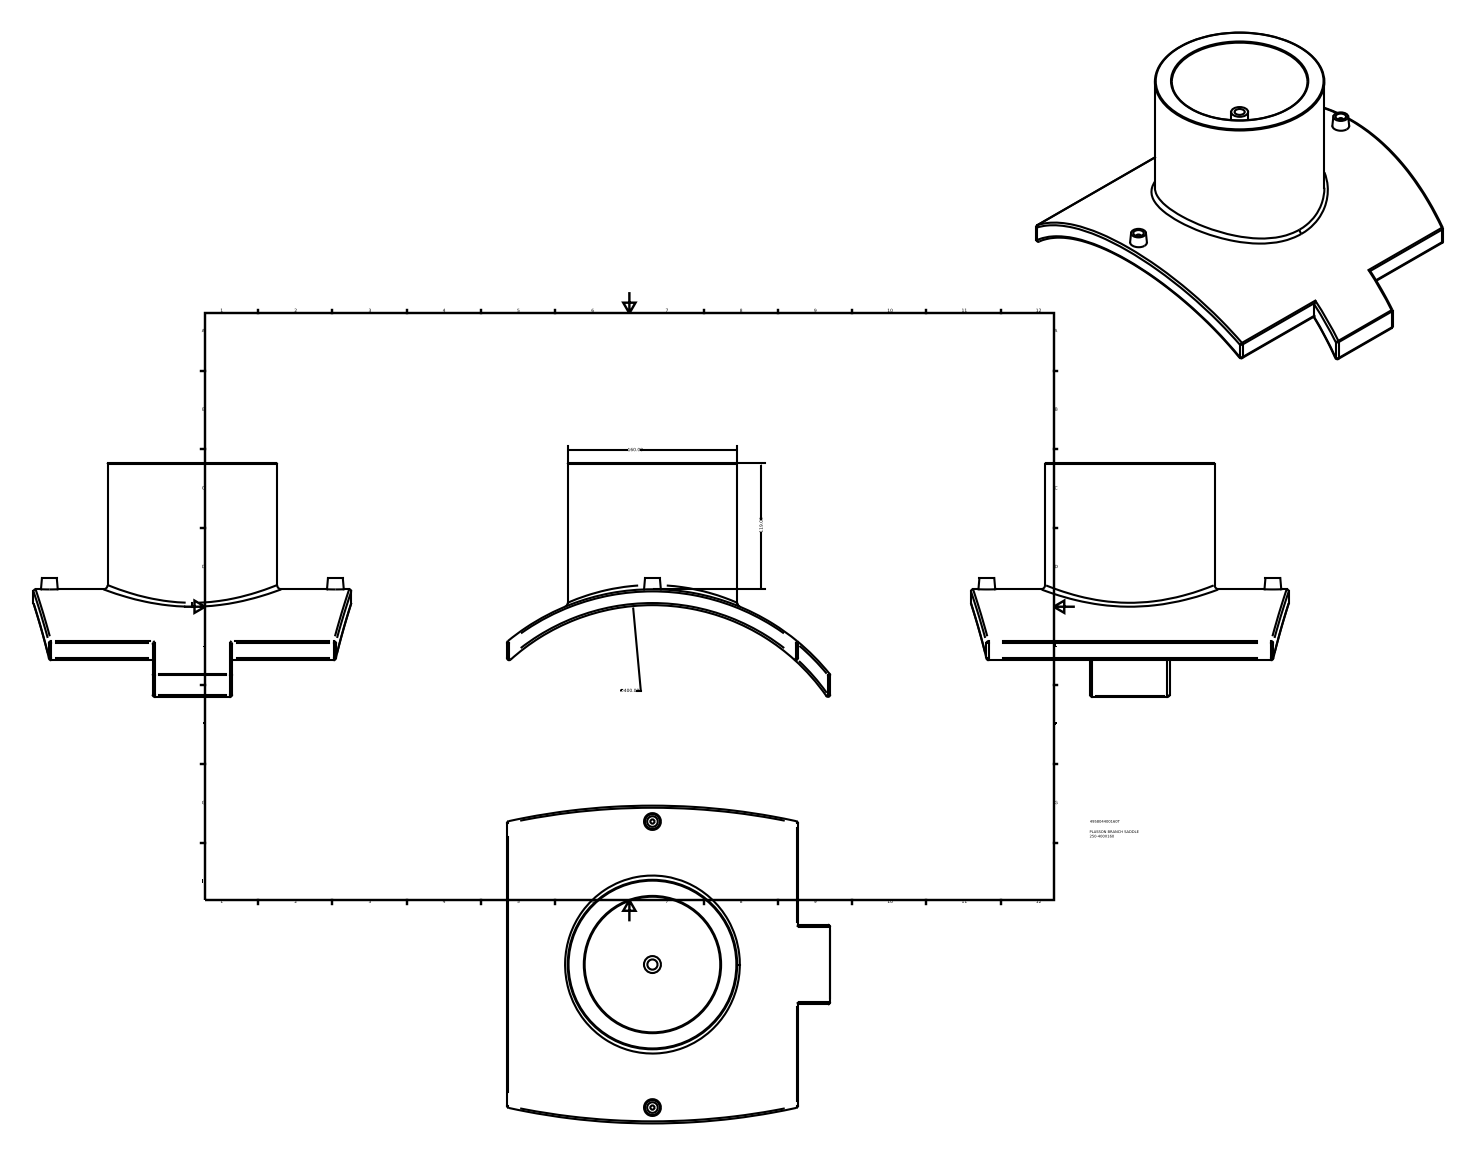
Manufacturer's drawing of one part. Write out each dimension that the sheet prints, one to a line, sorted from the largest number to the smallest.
∅400.00
160.00
119.00
